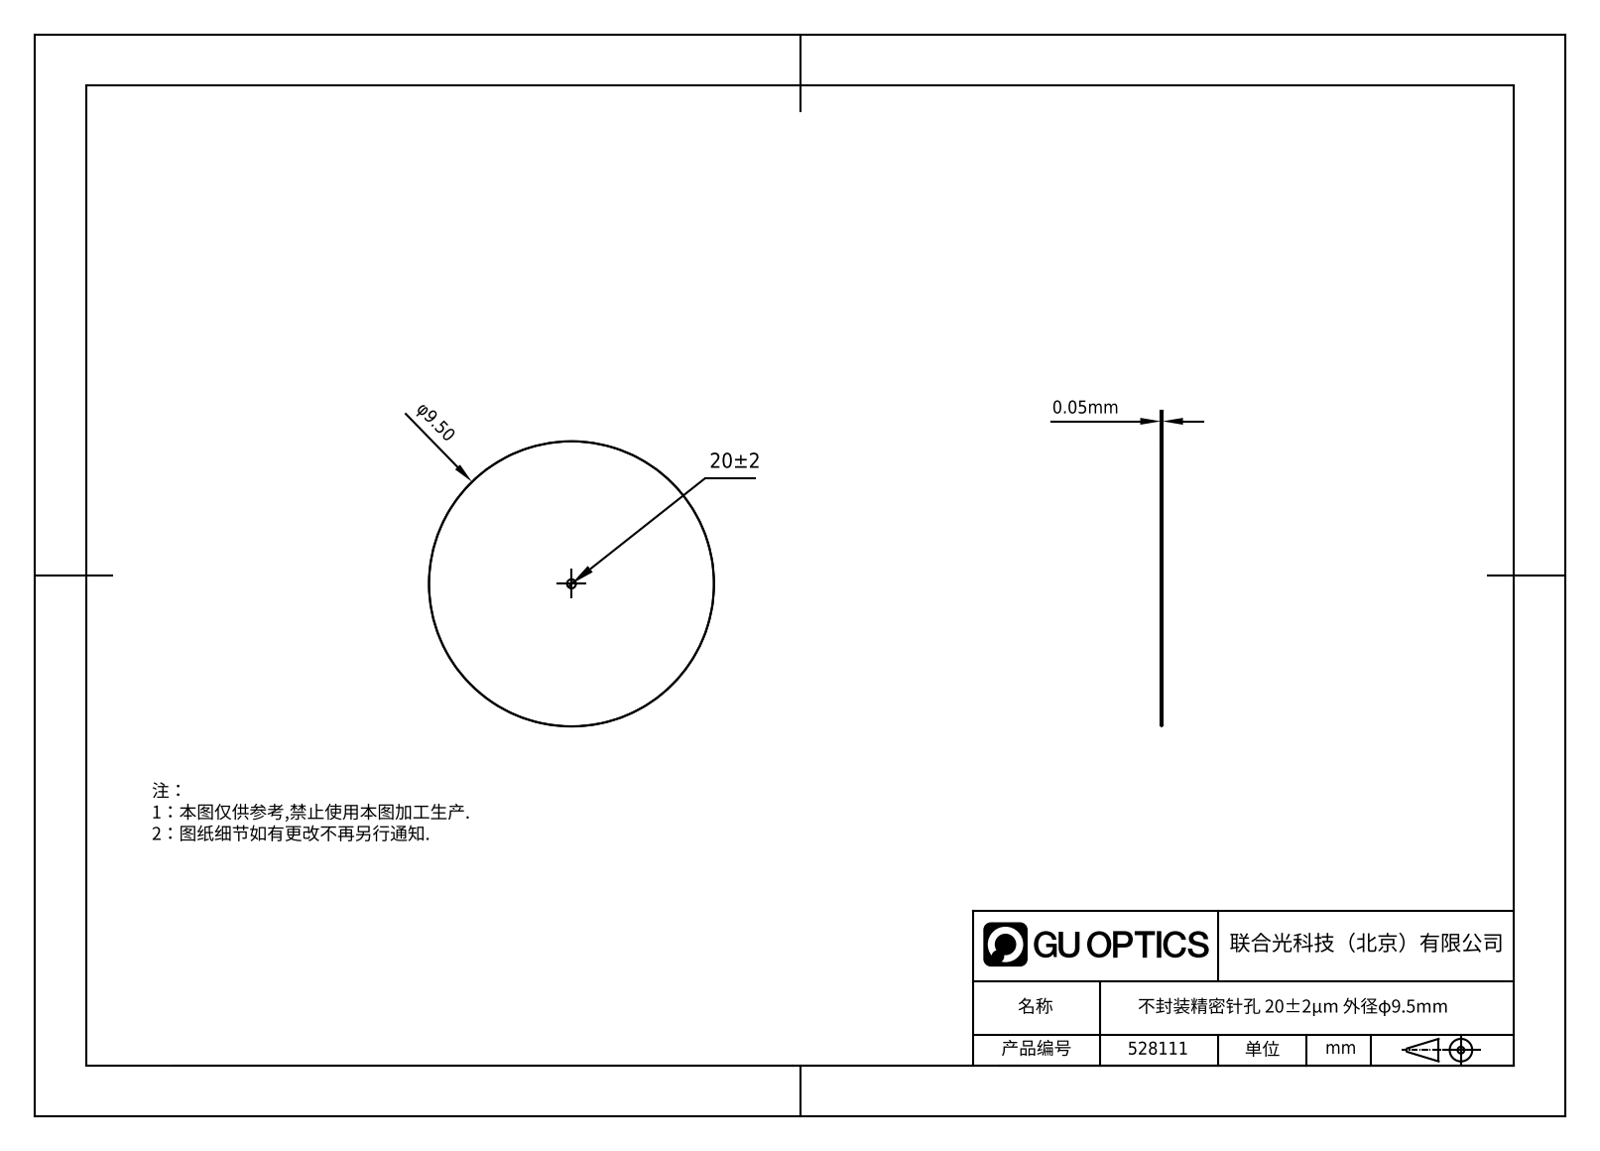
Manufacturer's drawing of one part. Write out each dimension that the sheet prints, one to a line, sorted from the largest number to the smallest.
φ9.50
0.05mm
